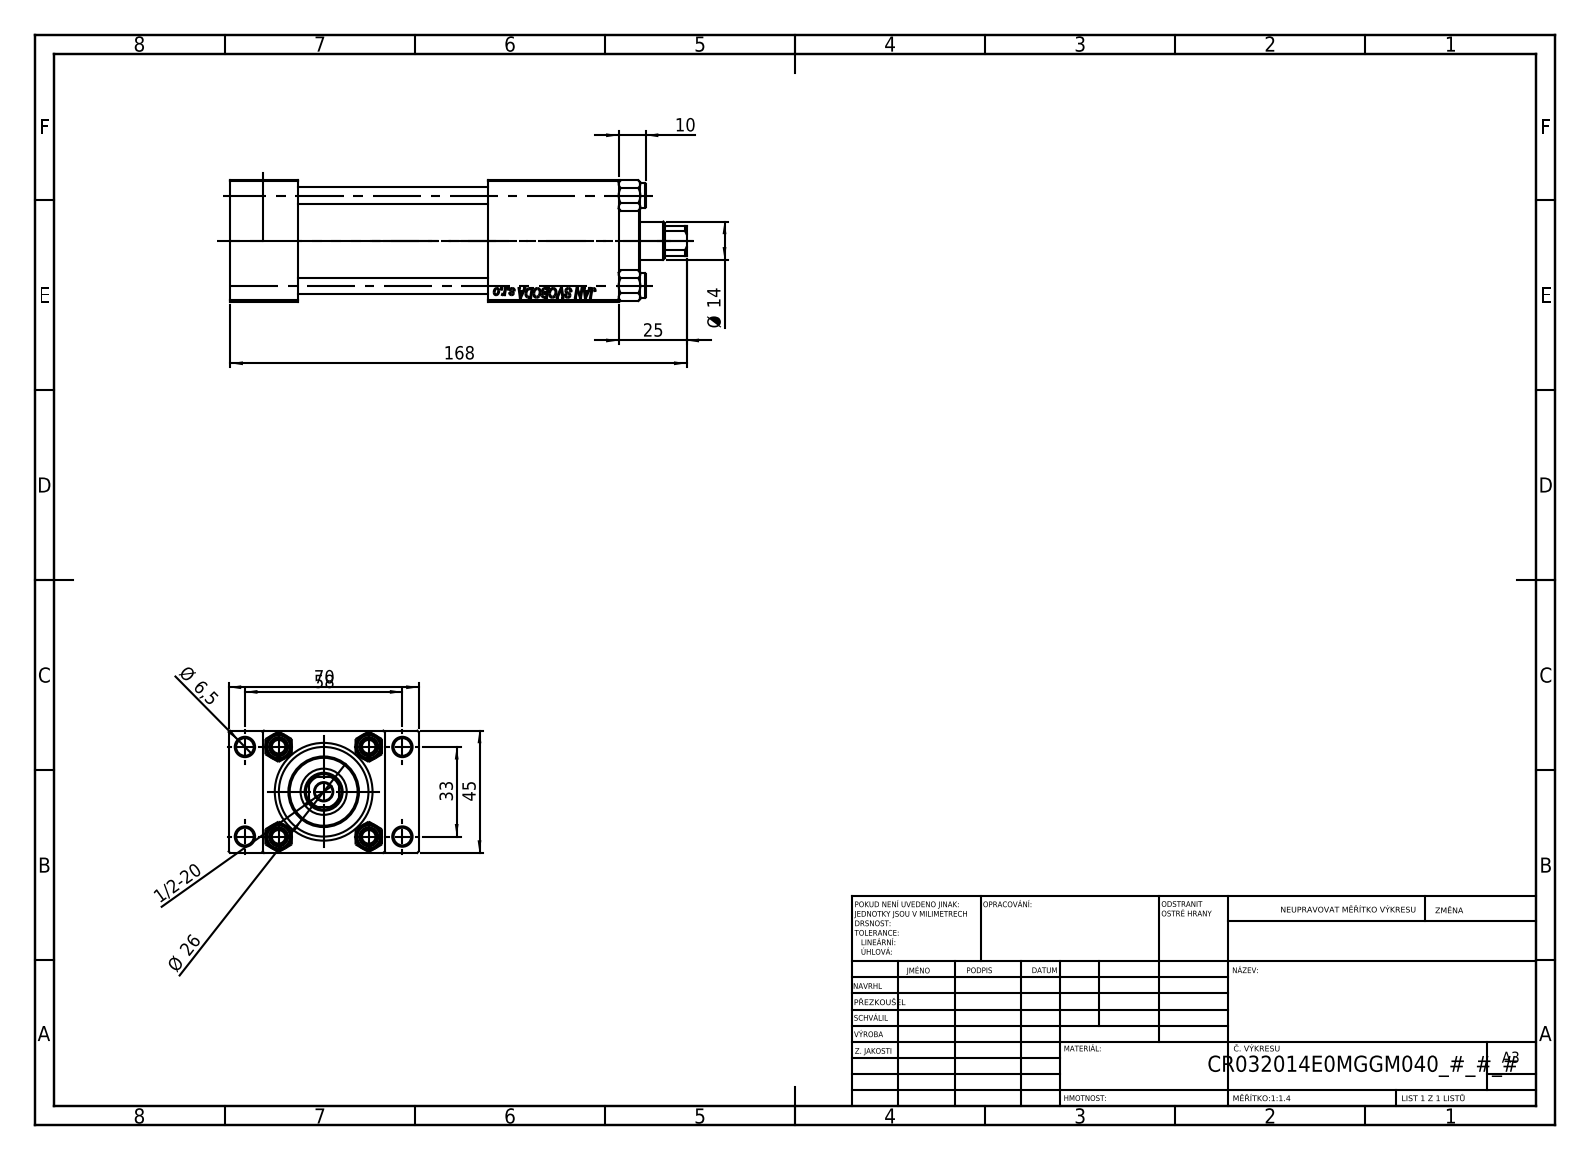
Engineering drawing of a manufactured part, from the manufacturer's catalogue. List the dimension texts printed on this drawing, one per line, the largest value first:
168
70
58
45
33
Ø 26
25
Ø 14
10
Ø 6,5
1/2-20
